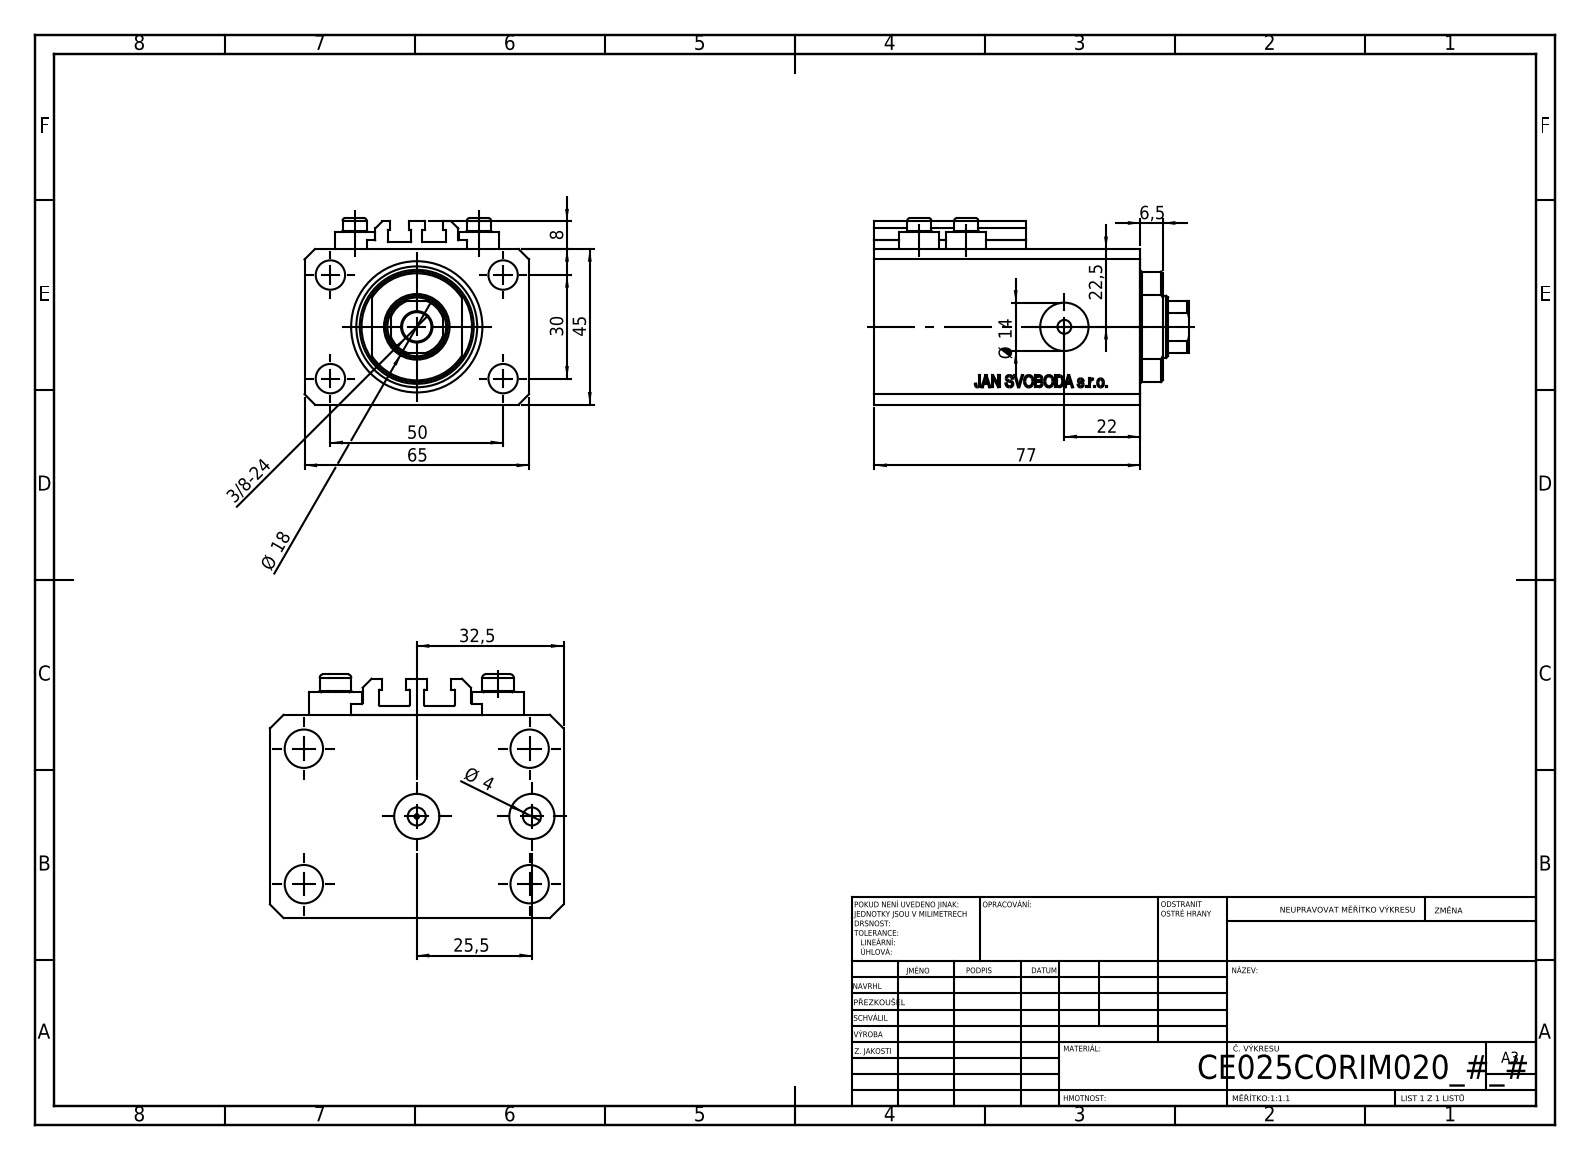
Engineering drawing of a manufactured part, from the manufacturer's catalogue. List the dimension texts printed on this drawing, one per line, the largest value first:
77
65
50
45
32,5
30
25,5
22,5
22
Ø 18
Ø 14
8
6,5
Ø 4
3/8-24
